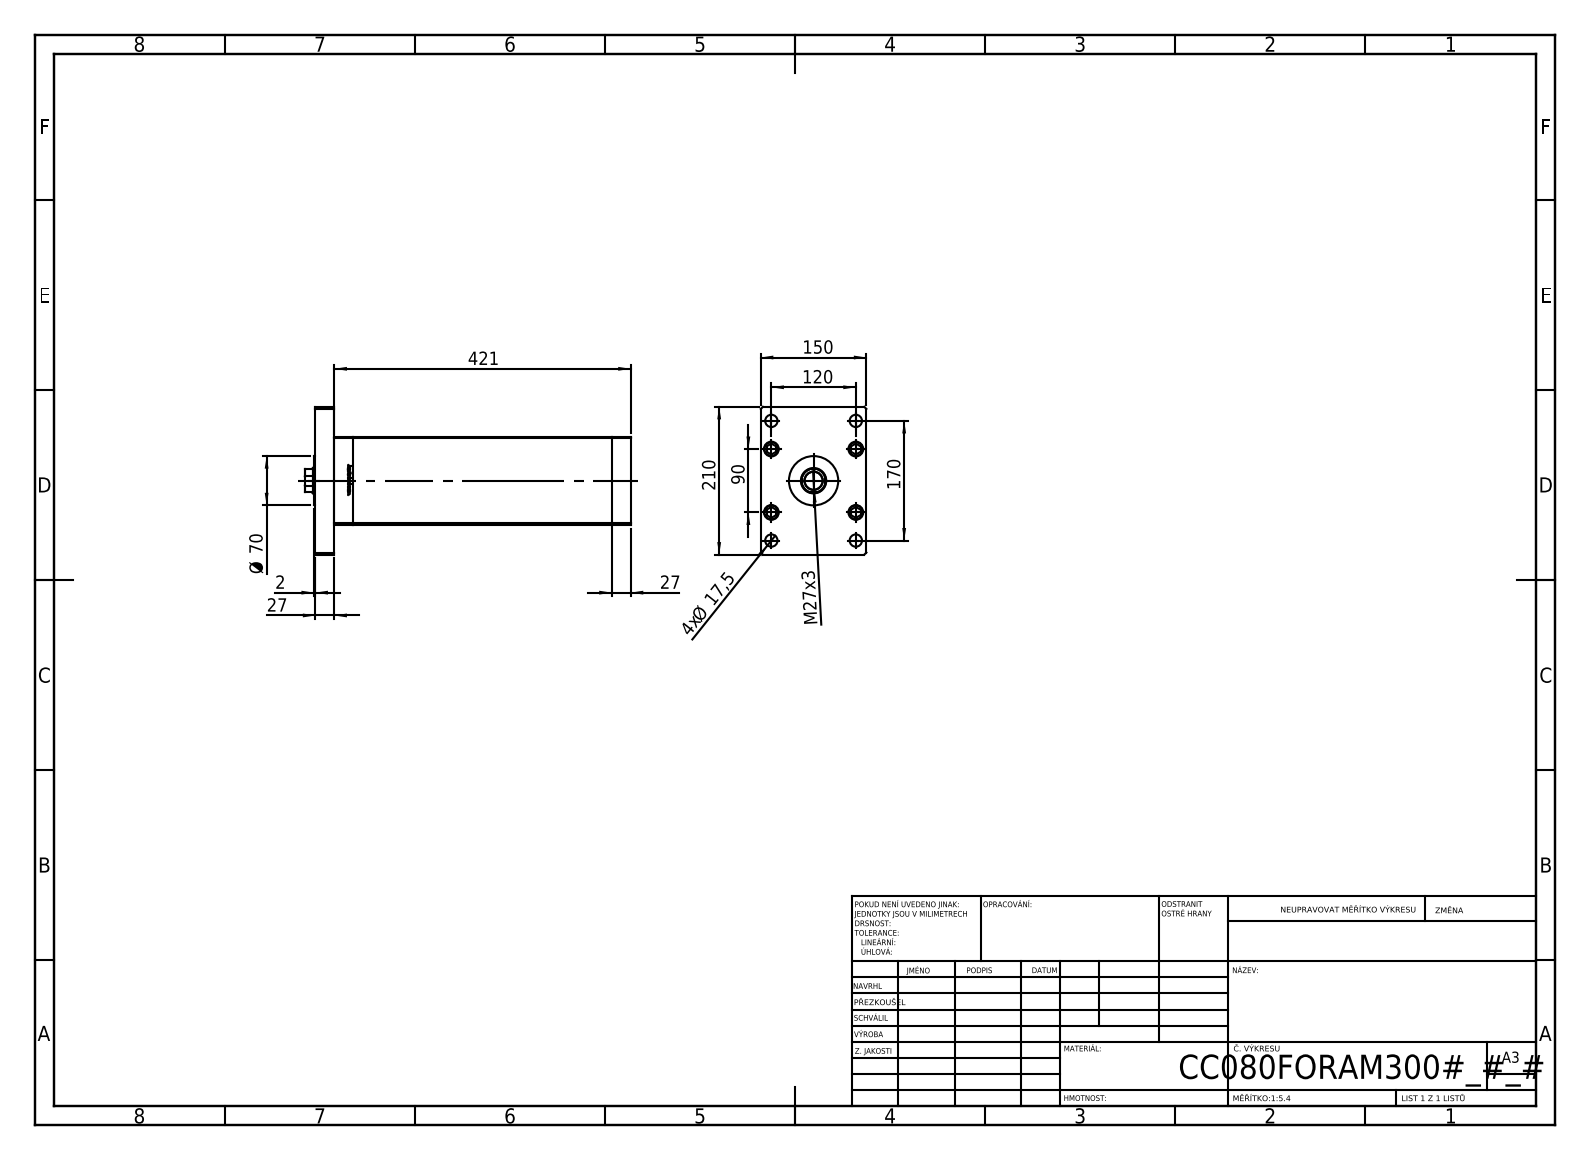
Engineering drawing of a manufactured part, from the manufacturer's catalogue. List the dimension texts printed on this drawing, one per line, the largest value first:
421
210
170
150
120
90
Ø 70
27
27
M27x3
4x Ø 17,5
2
